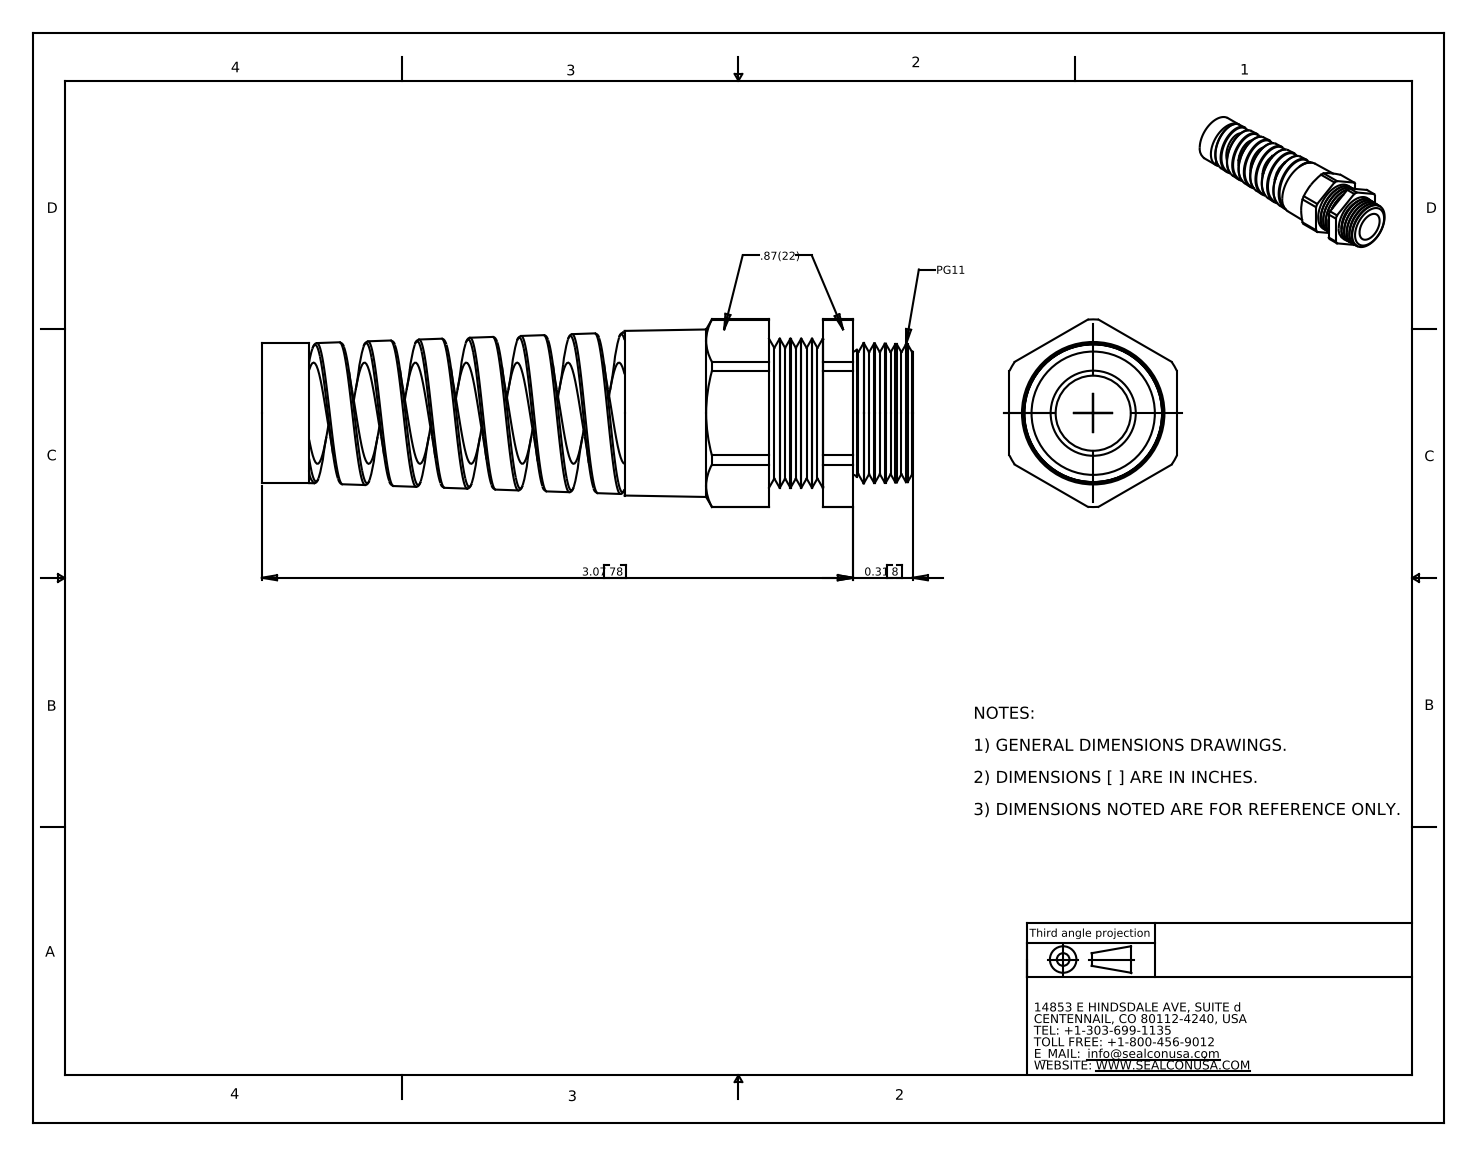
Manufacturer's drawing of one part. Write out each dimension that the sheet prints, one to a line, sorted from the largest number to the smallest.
3.07 78
0.31 8
